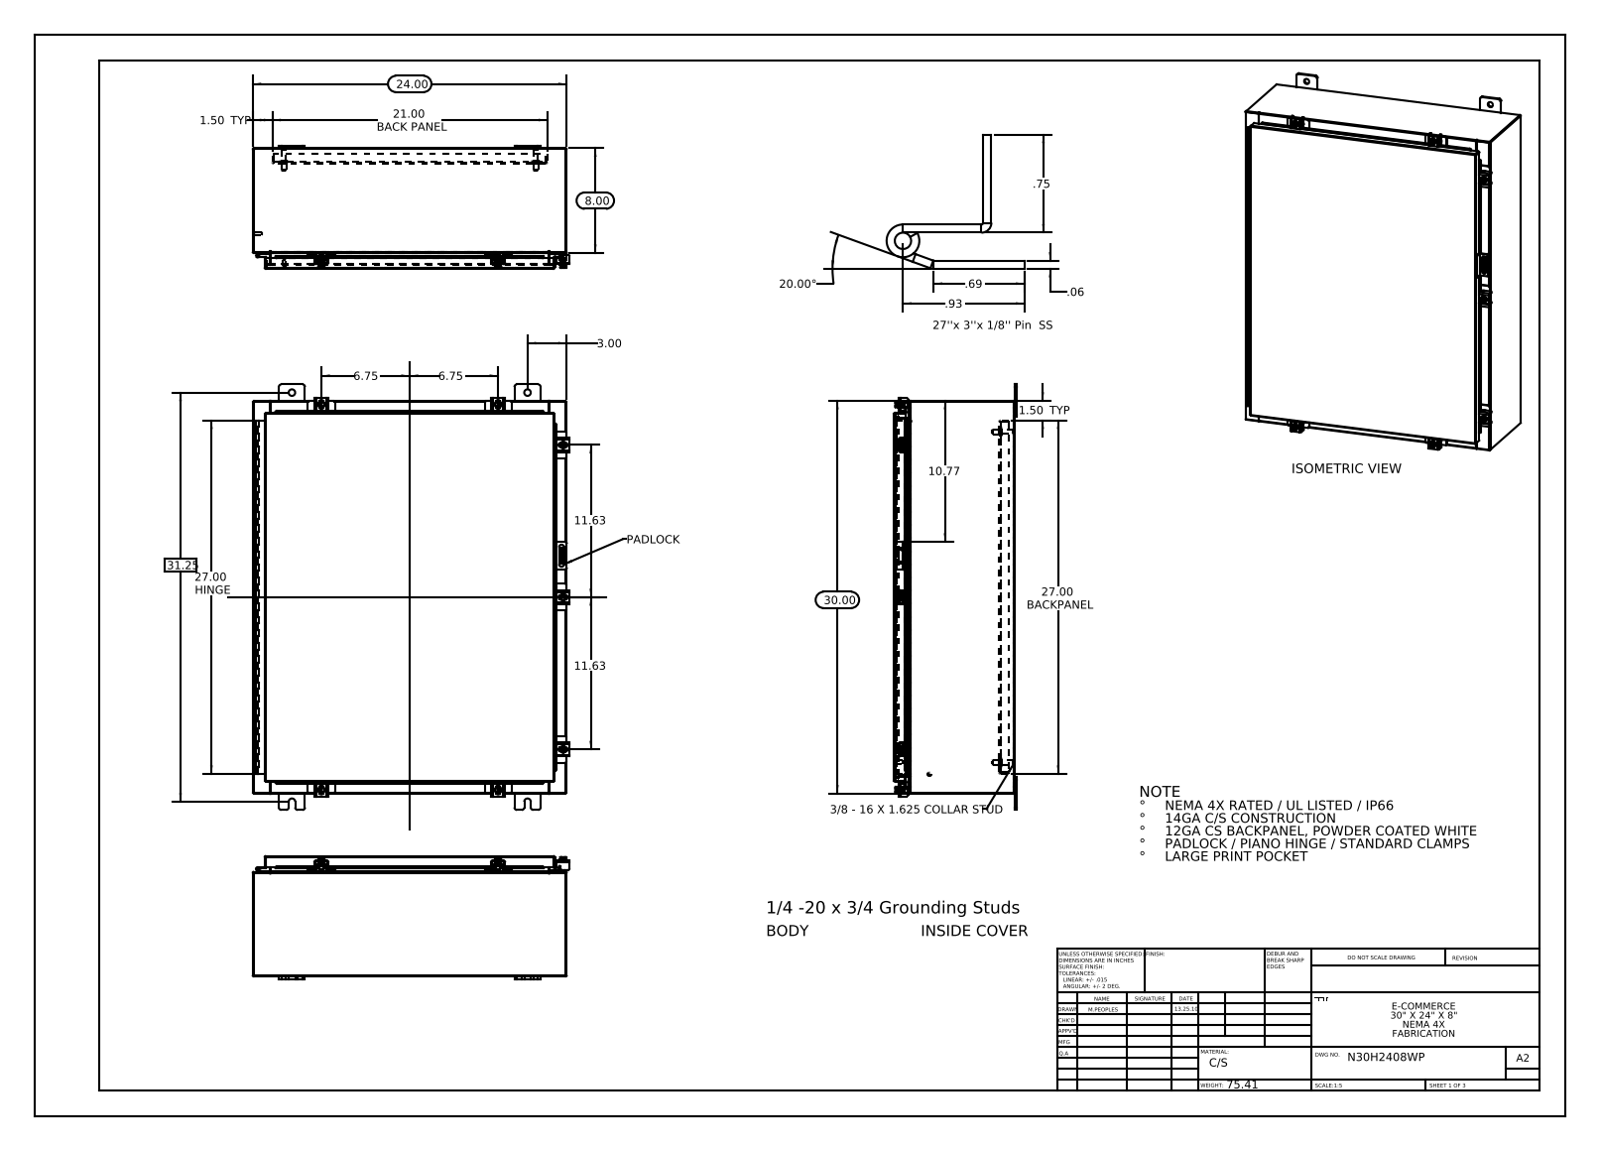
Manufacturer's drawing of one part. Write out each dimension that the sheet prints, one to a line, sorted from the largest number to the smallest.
31.25
30.00
27.00 HINGE
27.00 BACKPANEL
24.00
21.00 BACK PANEL
20.00°
11.63
11.63
10.77
8.00
6.75
6.75
3.00
1.50 TYP
1.50 TYP
.93
.75
.69
.06
